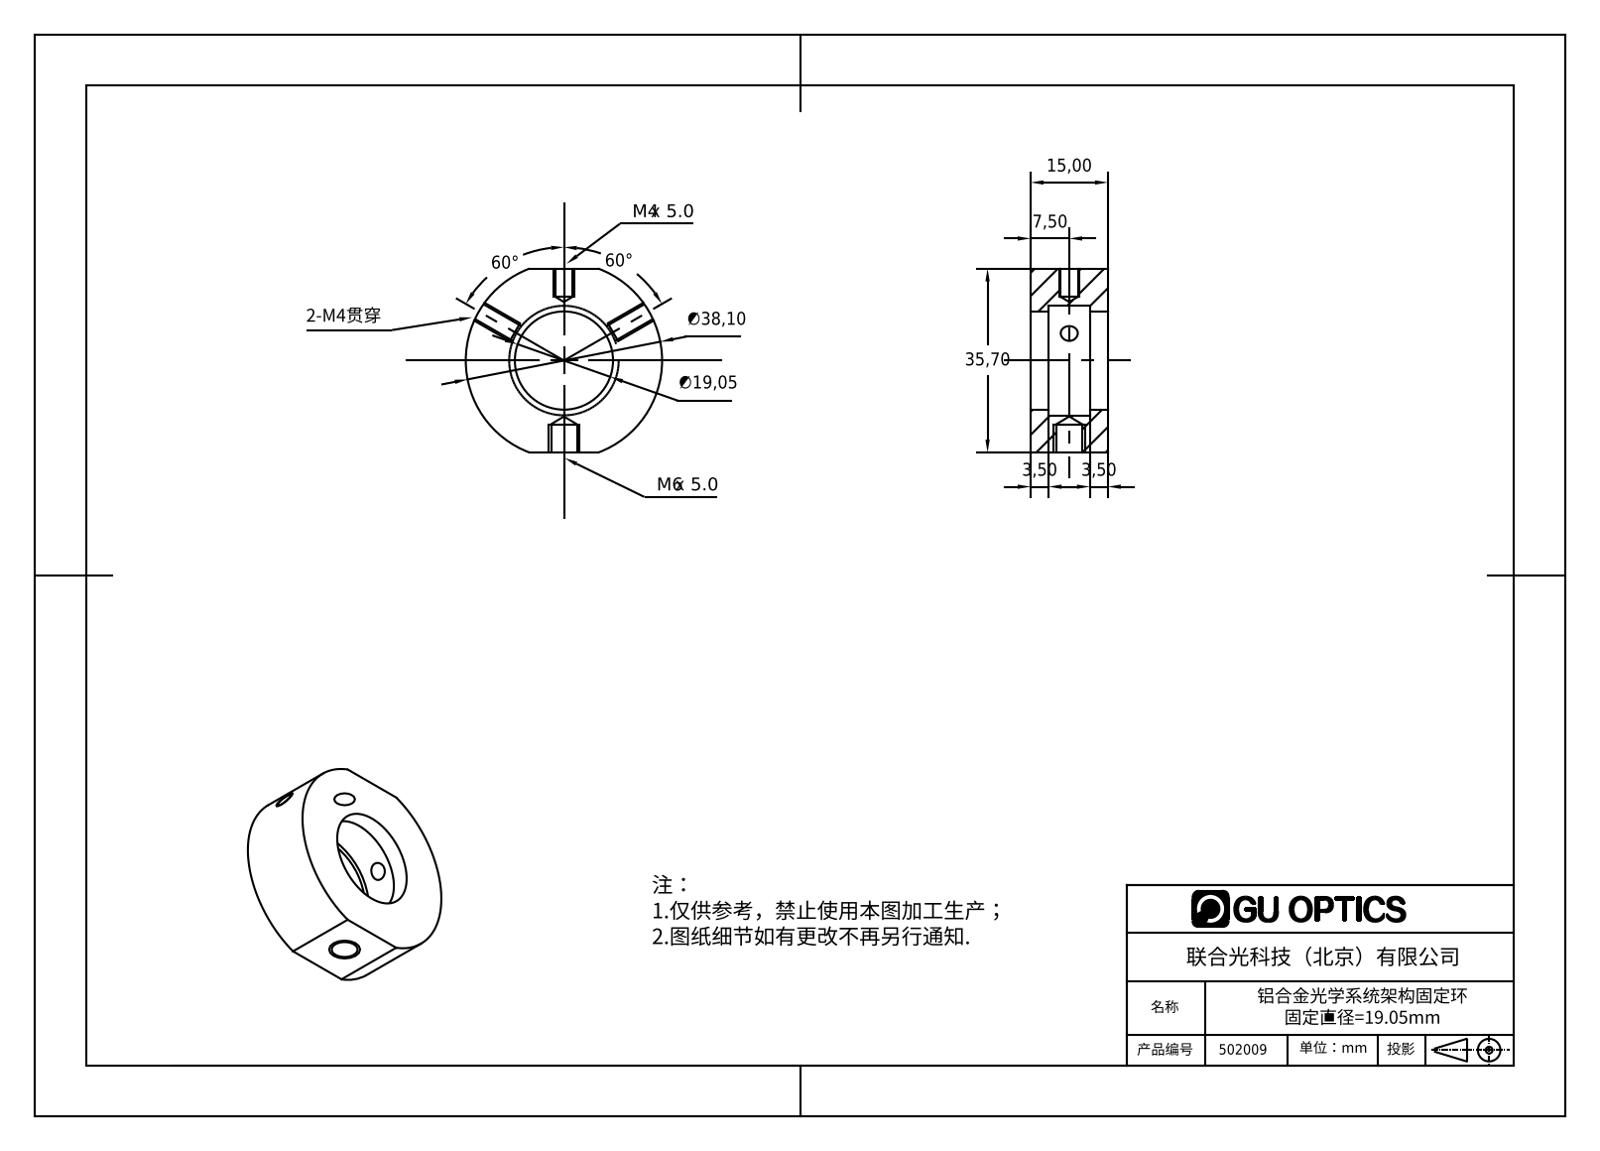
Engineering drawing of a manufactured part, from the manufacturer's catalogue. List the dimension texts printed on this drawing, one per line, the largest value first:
60°
60°
∅38,10
35,70
∅19,05
15,00
7,50
3,50
3,50
